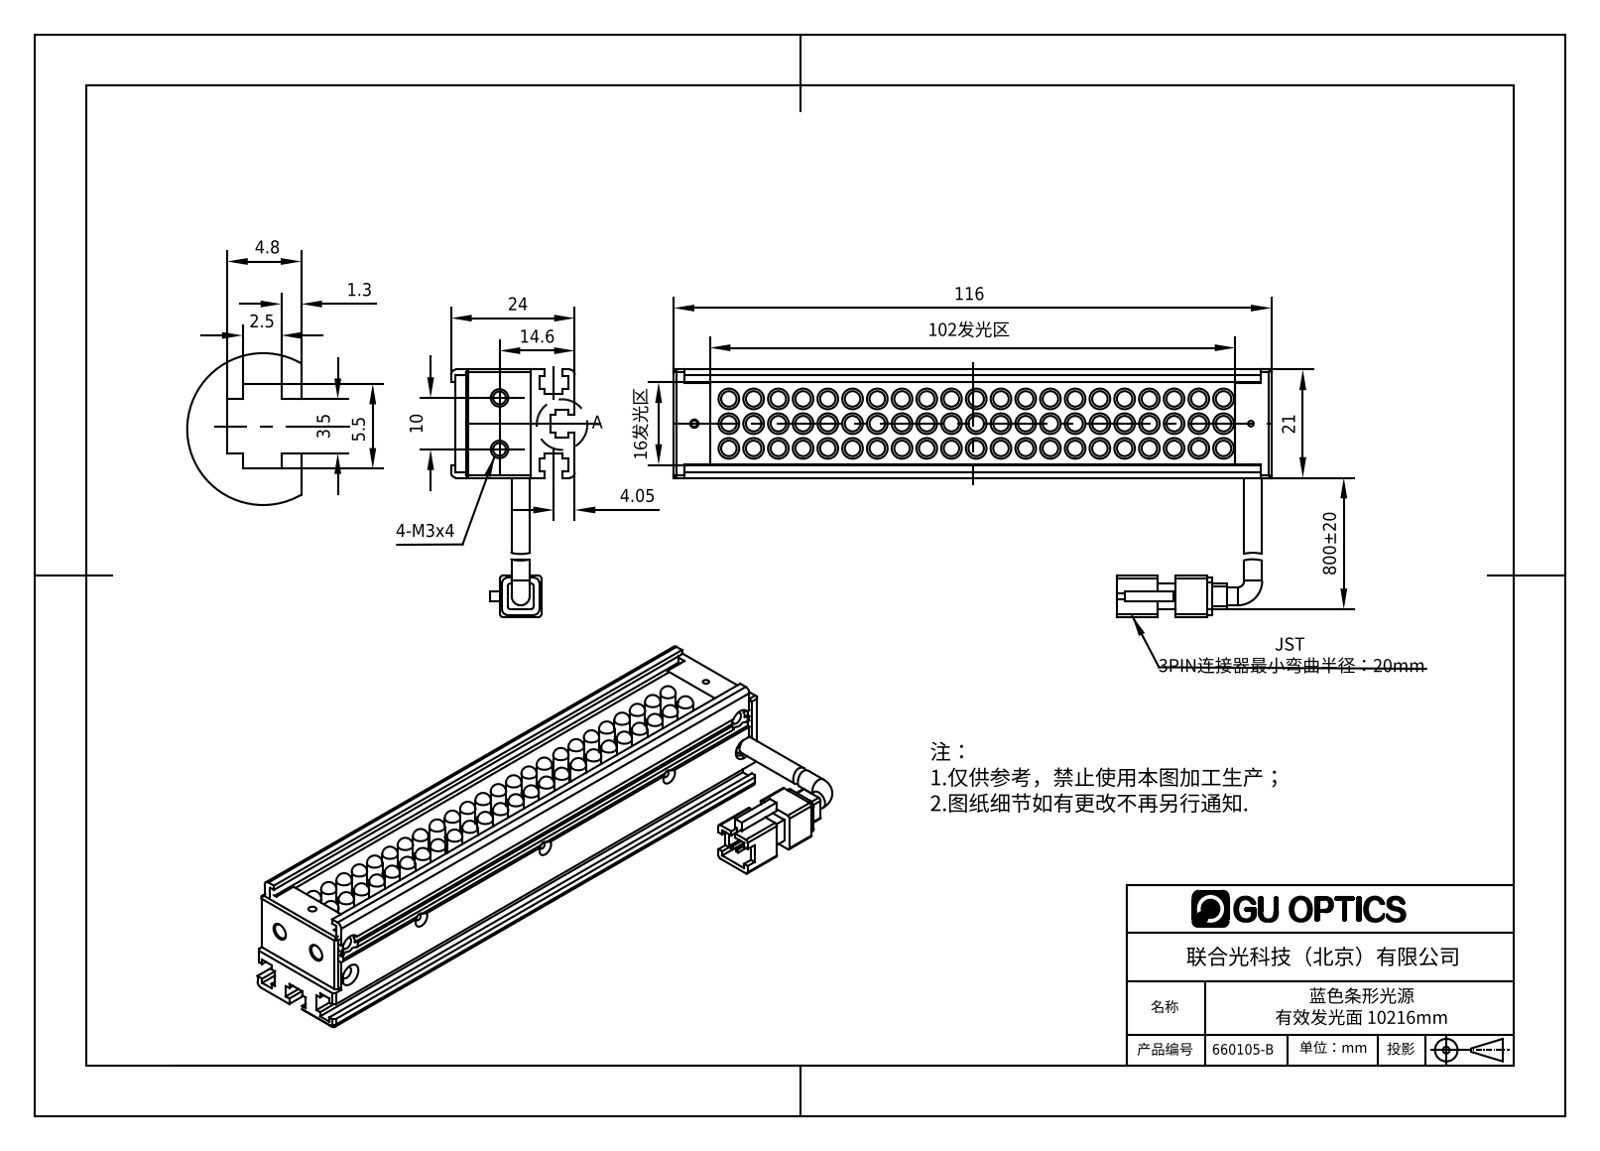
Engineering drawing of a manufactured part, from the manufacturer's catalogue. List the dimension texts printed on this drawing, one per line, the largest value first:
800±20
116
102发光区
24
21
16发光区
14.6
10
5.5
4.8
4.05
3.5
2.5
1.3
